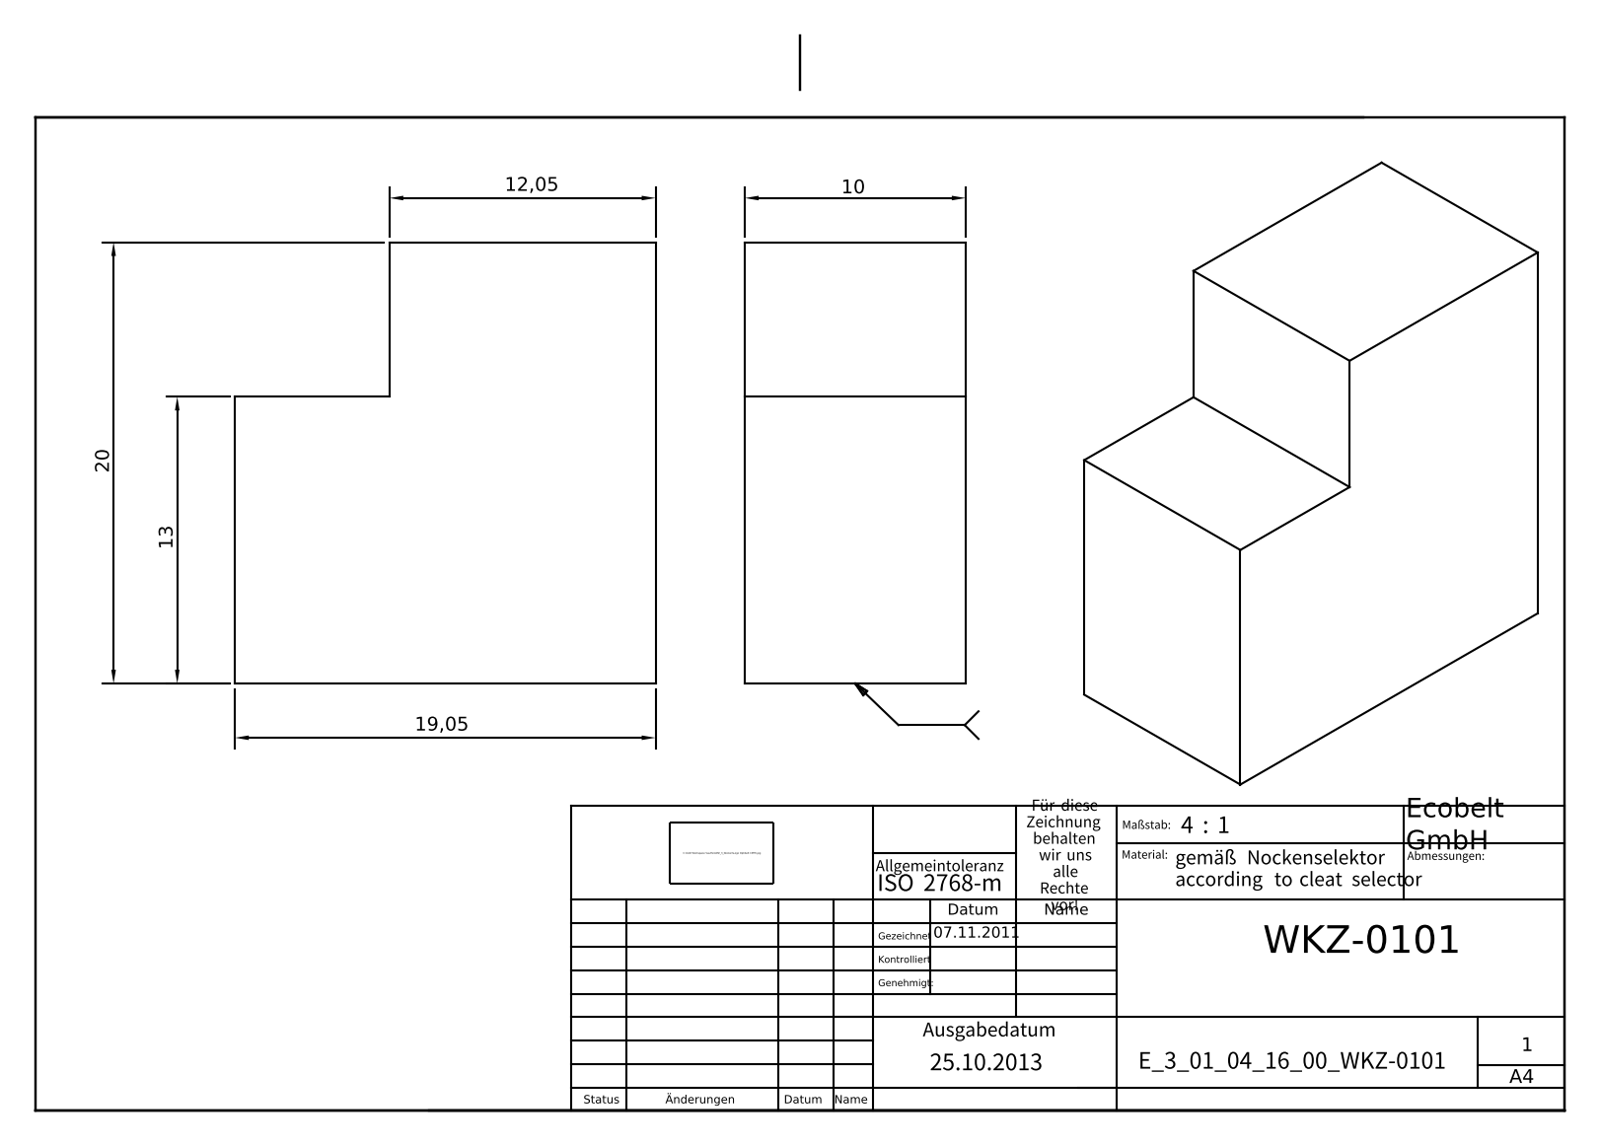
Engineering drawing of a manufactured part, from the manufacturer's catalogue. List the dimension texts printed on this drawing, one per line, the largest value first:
20
19,05
13
12,05
10
